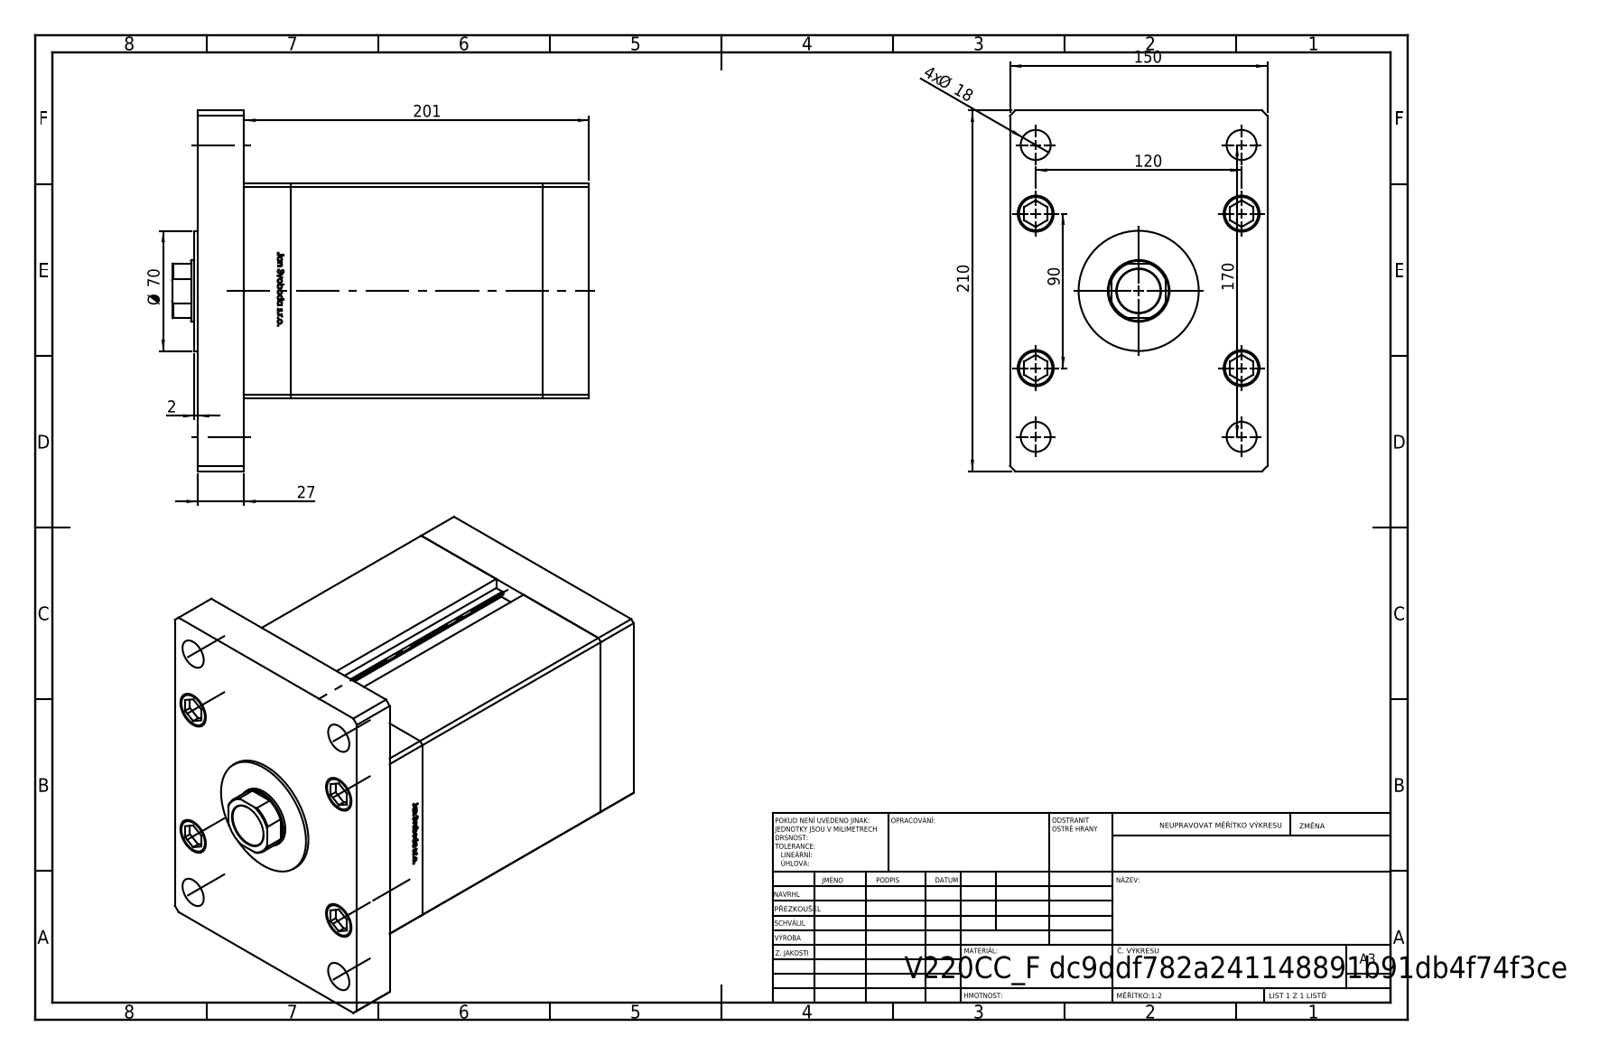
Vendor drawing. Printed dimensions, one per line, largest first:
210
201
170
150
120
90
Ø 70
27
4x Ø 18
2
